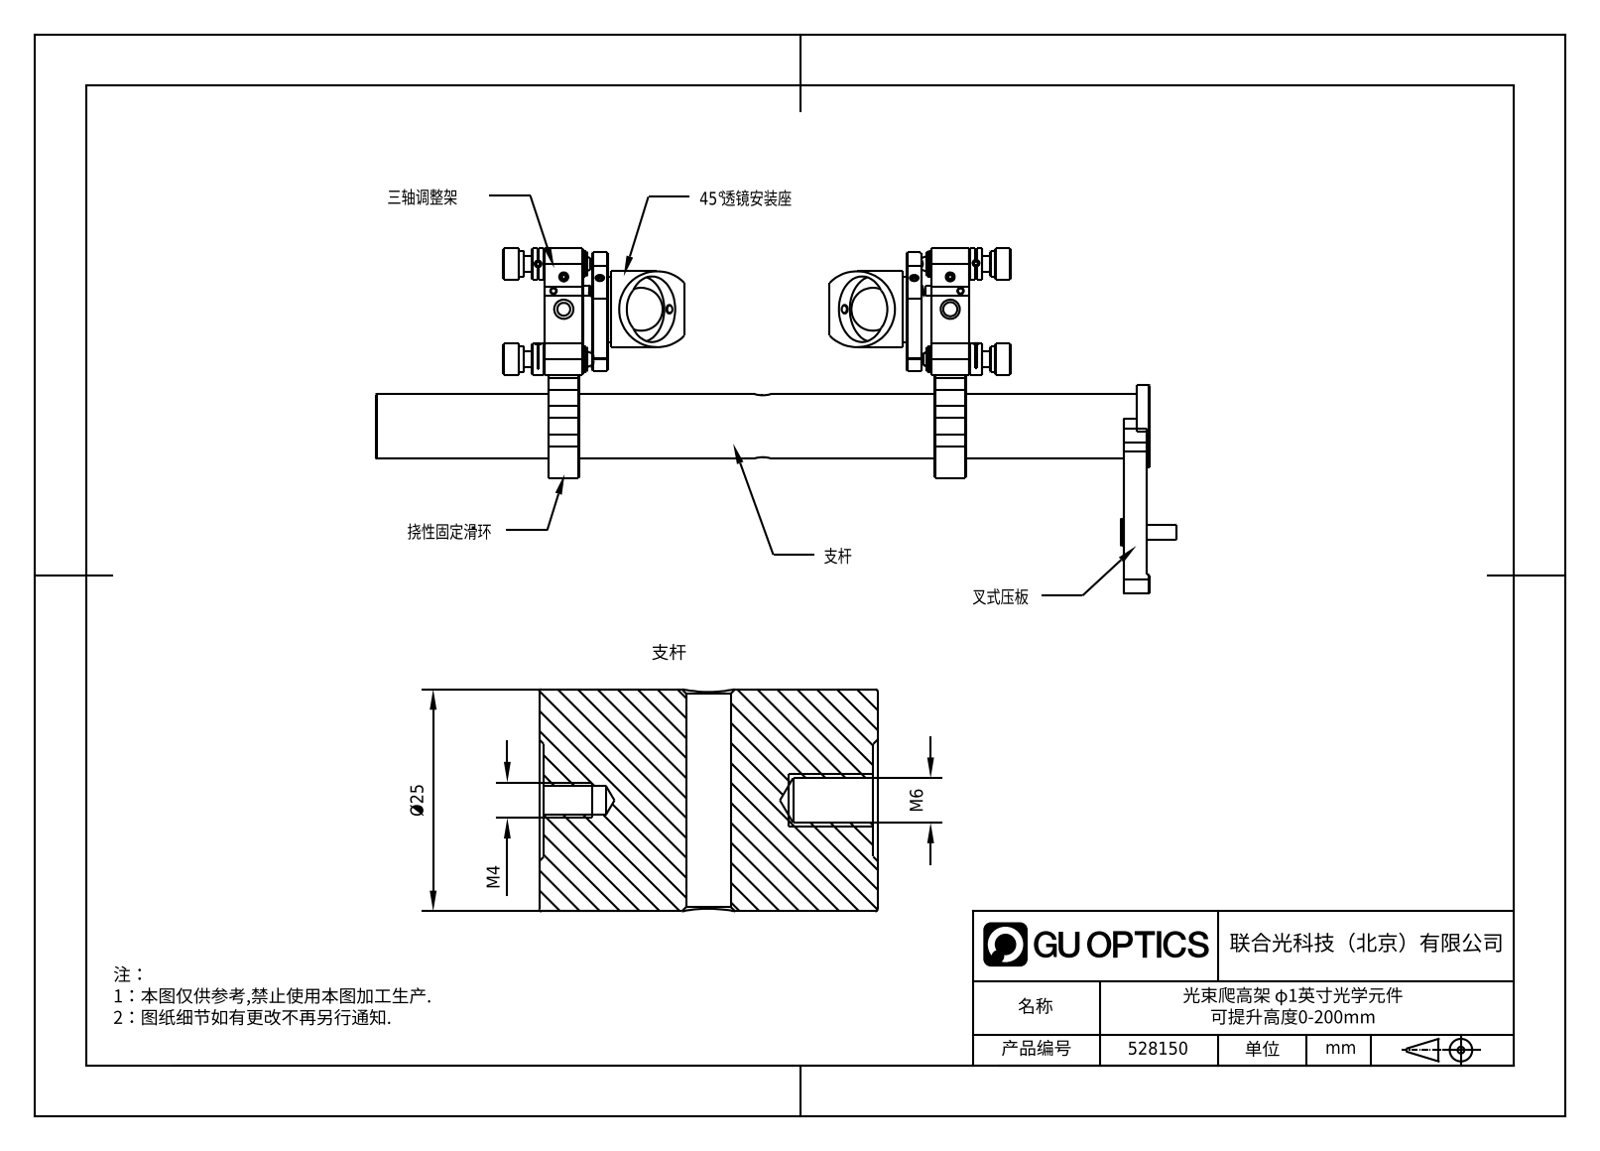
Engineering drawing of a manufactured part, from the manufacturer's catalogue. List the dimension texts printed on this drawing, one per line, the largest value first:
Ø25
M6
M4
